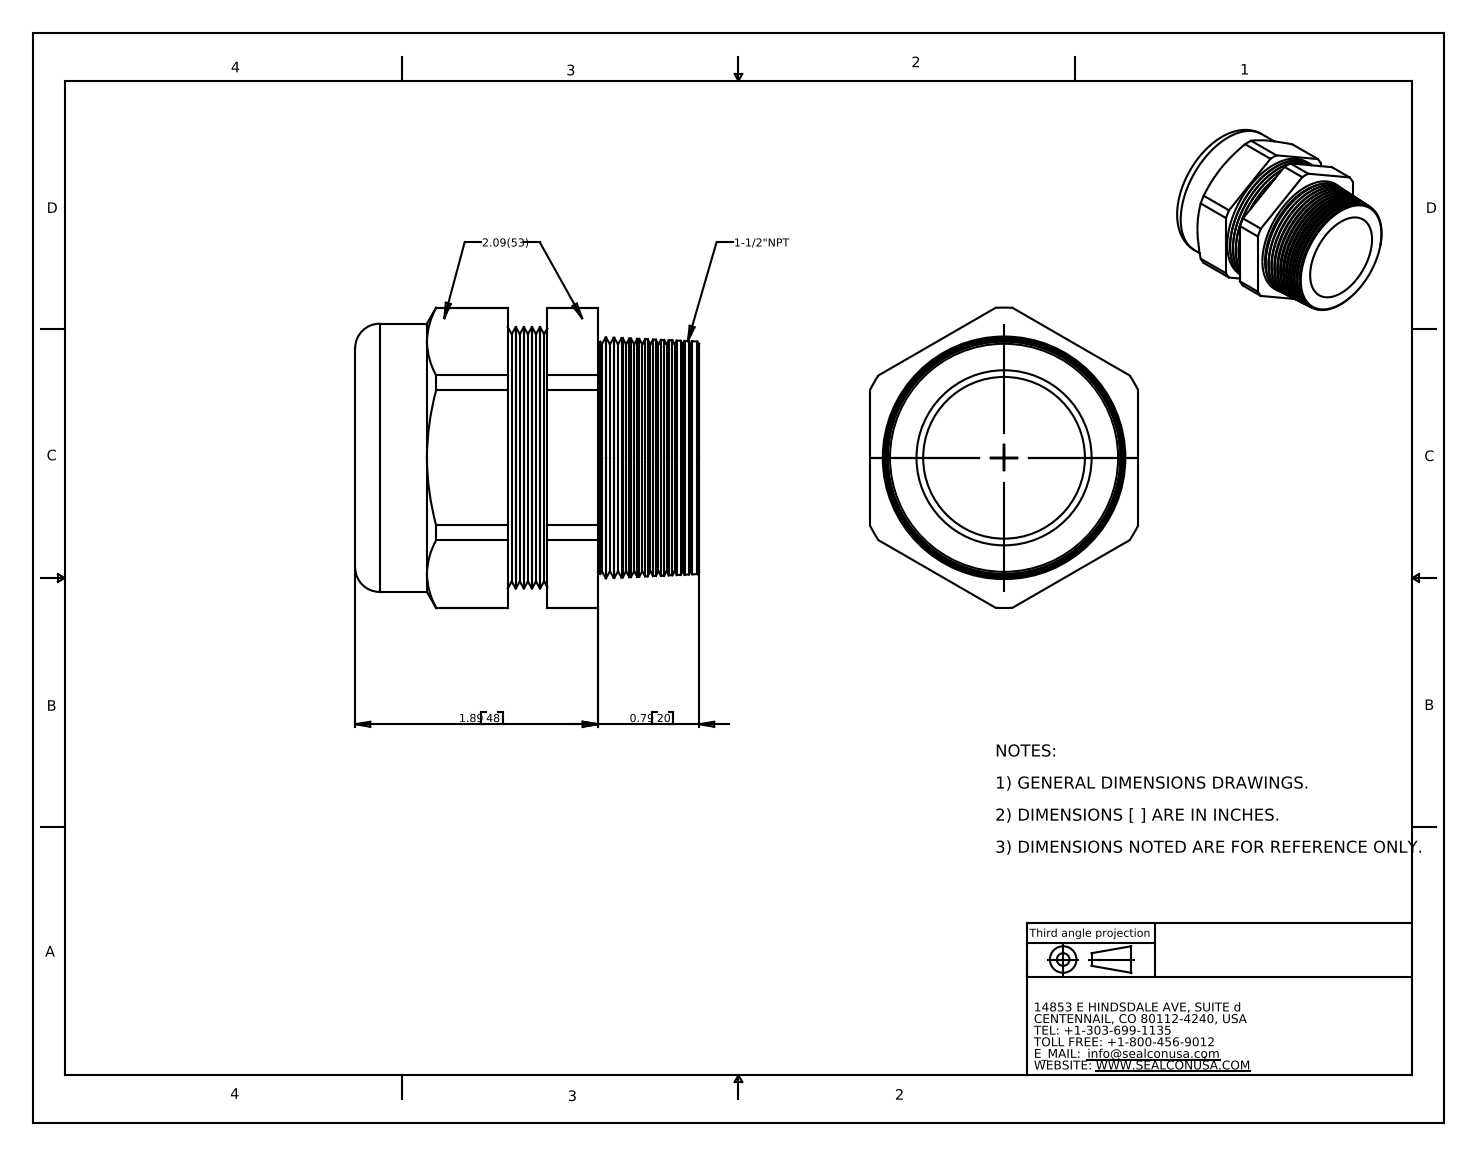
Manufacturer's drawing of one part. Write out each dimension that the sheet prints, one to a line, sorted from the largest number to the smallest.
1.89 48
0.79 20
